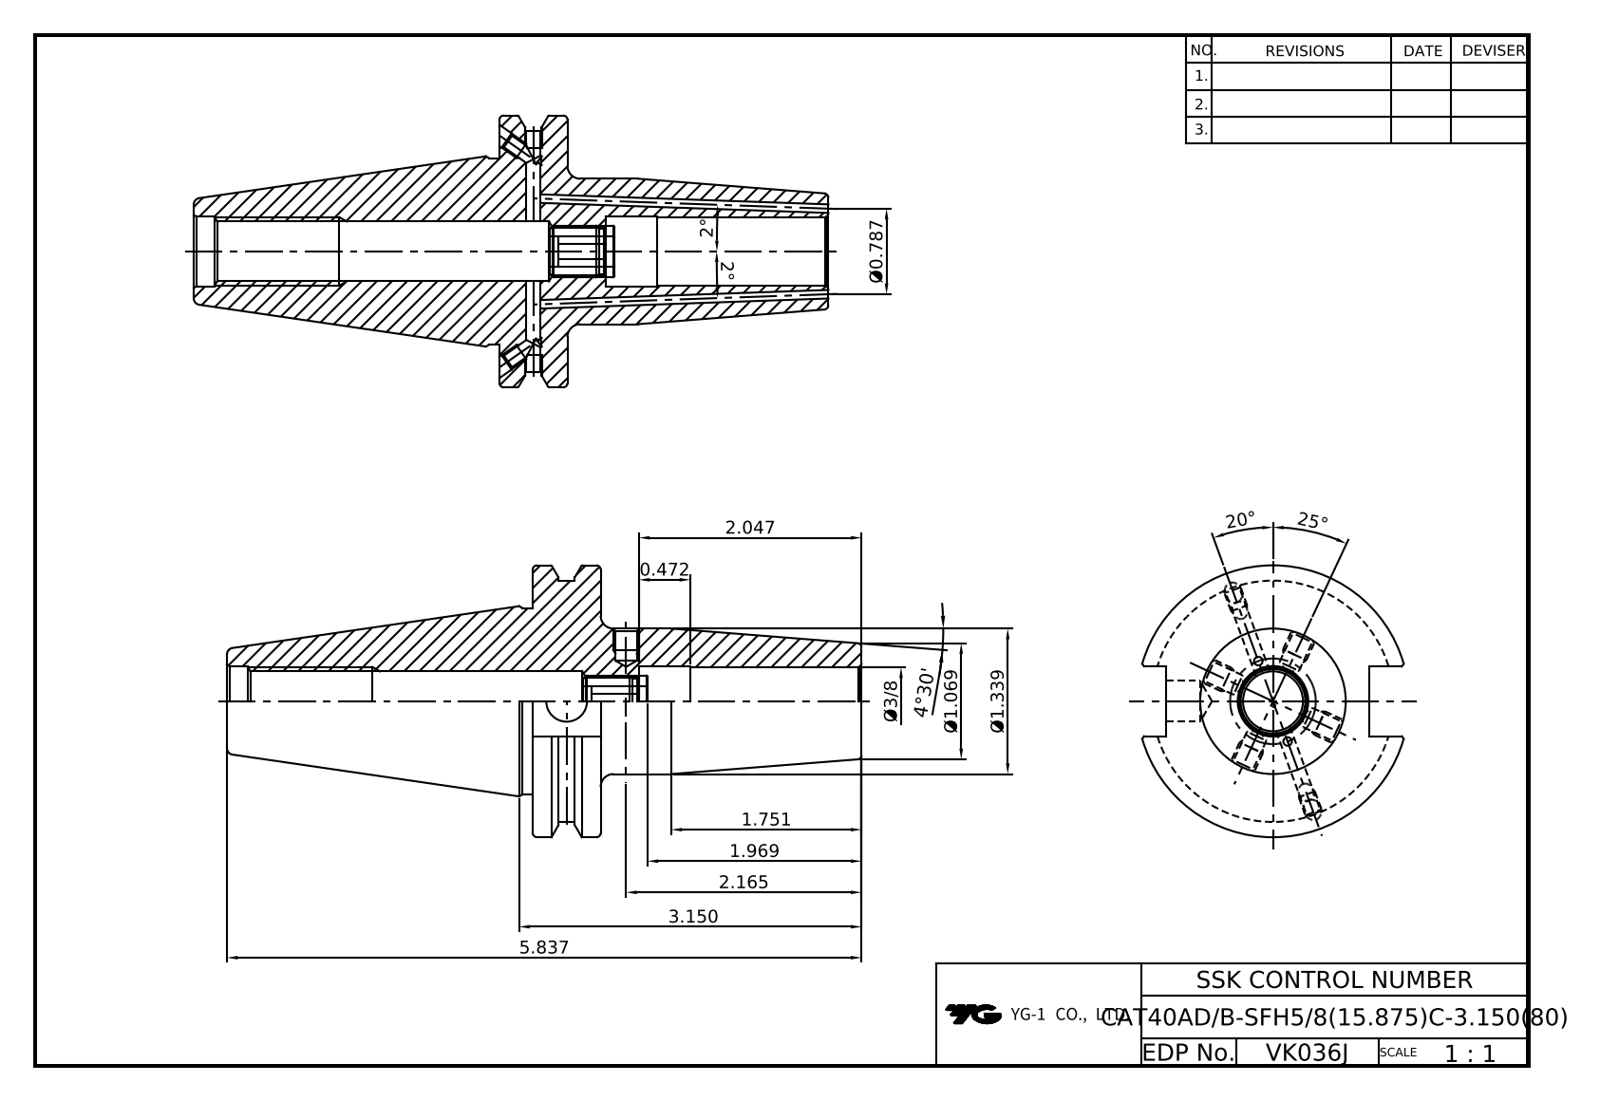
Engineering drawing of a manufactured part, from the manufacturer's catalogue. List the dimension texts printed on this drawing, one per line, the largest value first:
25°
20°
5.837
4°30'
3.150
2.165
2.047
2°
2°
1.969
1.751
Ø1.339
Ø1.069
Ø0.787
0.472
